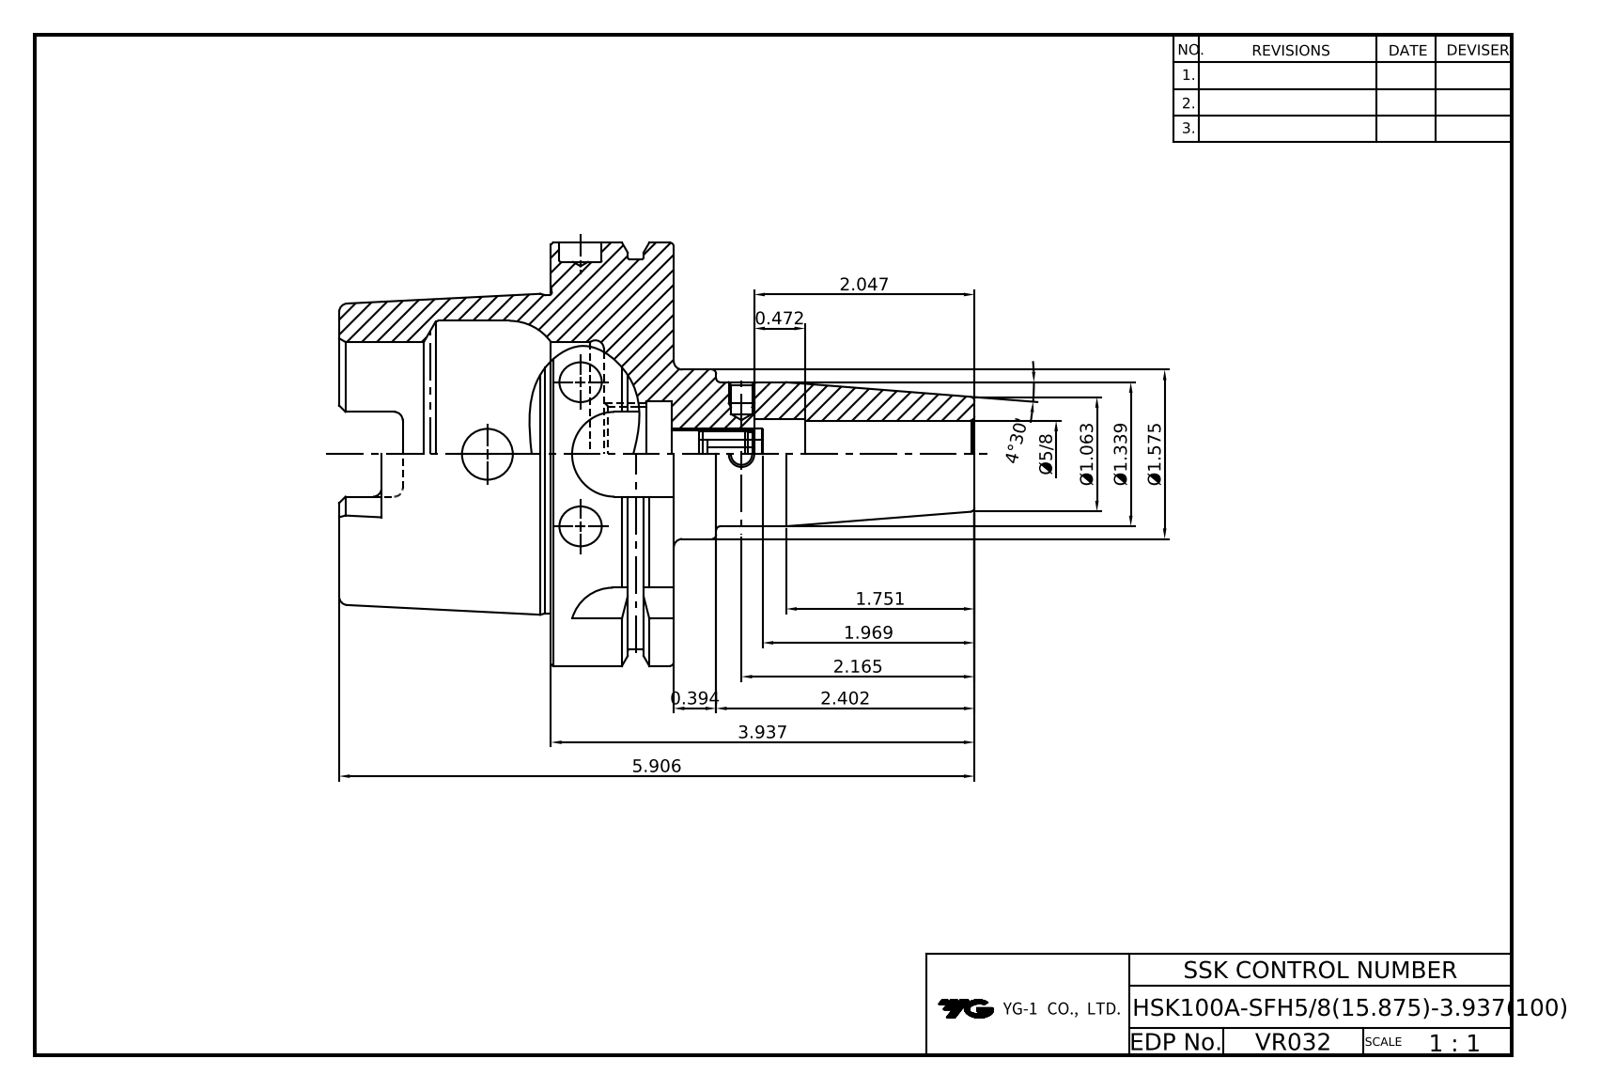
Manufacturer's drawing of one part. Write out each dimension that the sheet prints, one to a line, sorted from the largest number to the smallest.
5.906
4°30'
3.937
2.402
2.165
2.047
1.969
1.751
Ø1.575
Ø1.339
Ø1.063
0.472
0.394
